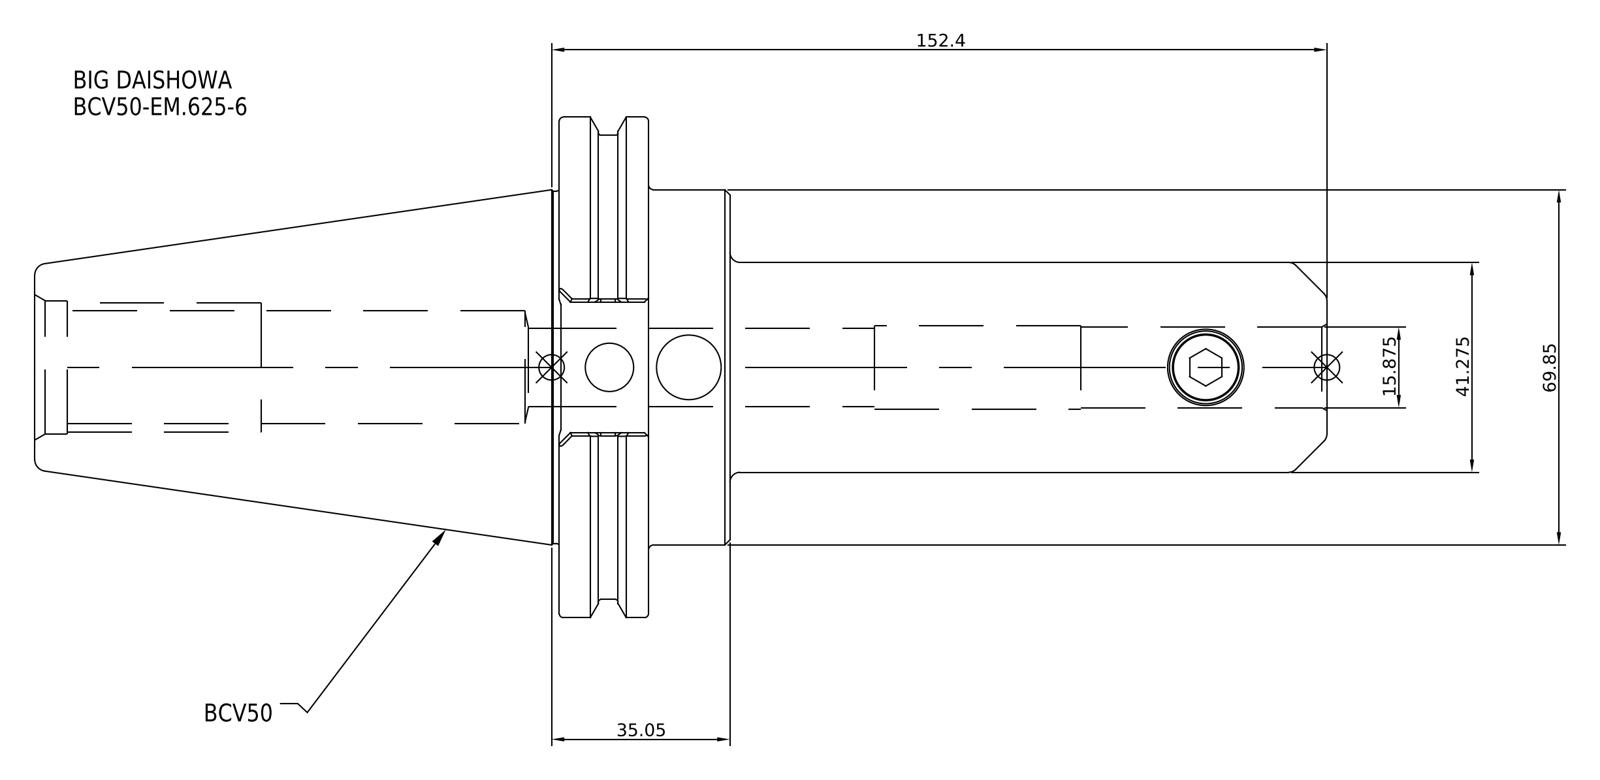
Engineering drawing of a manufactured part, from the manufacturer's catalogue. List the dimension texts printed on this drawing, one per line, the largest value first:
152.4
69.85
41.275
35.05
15.875
